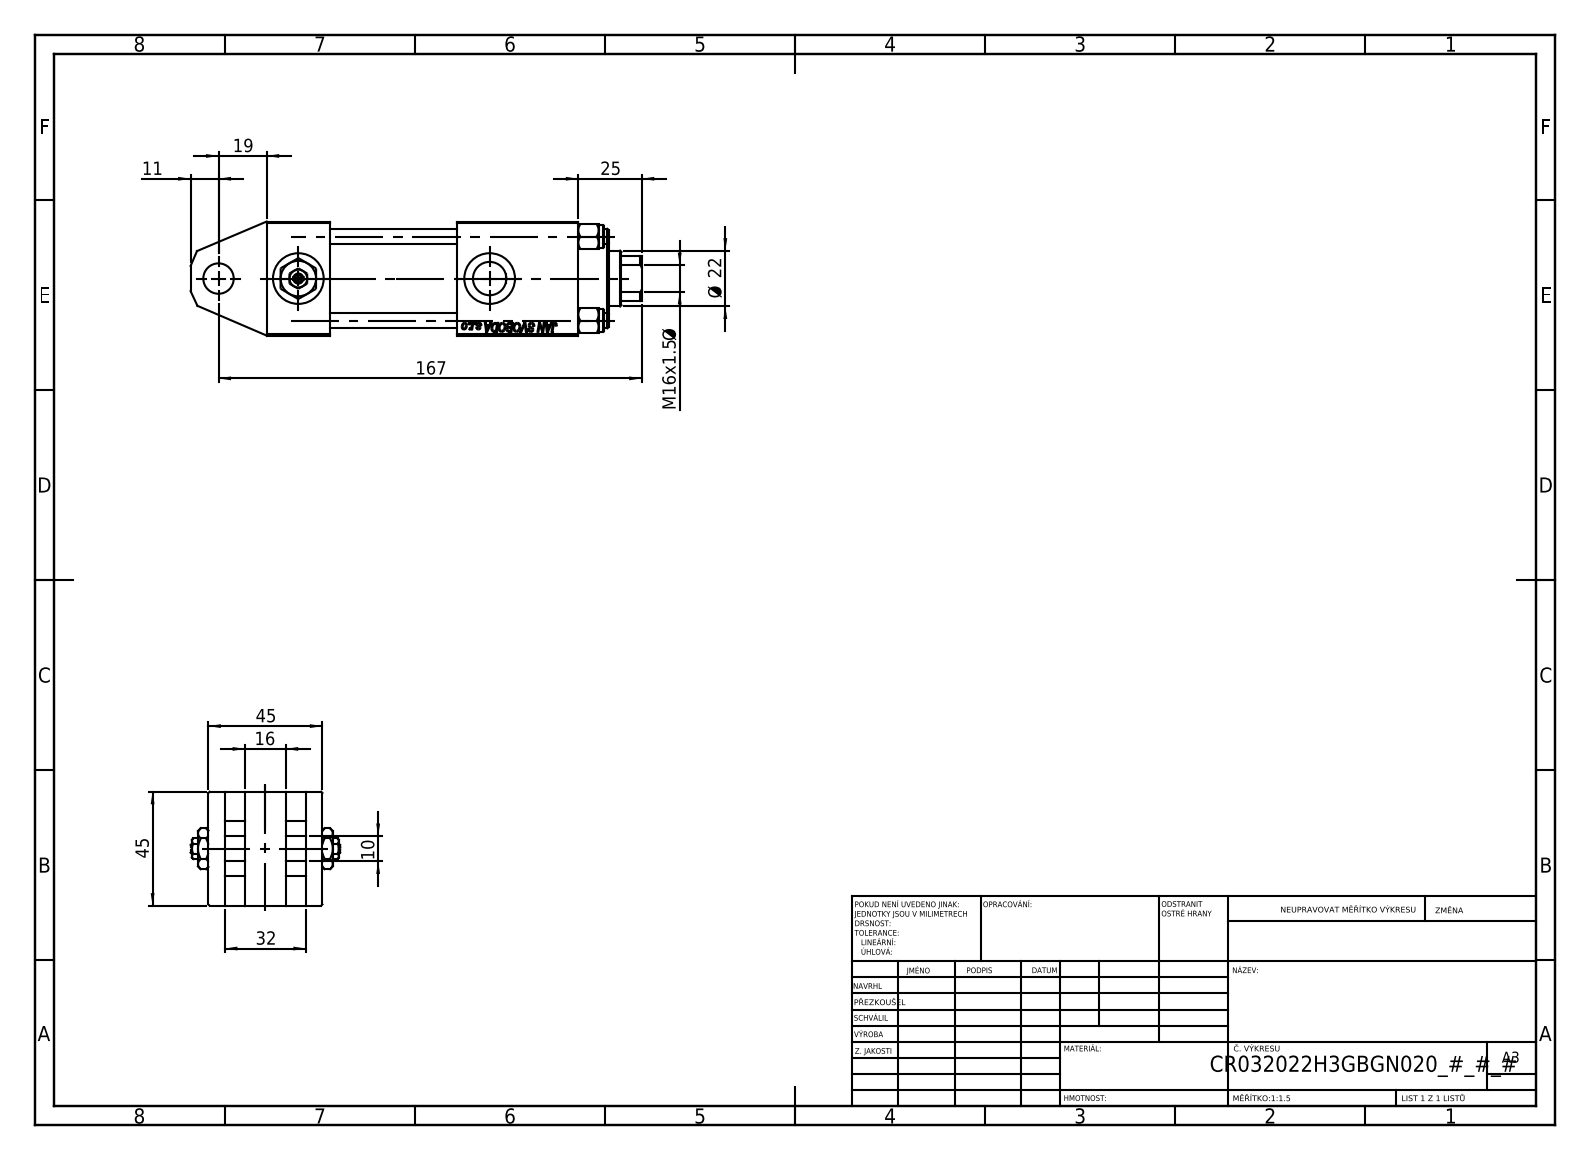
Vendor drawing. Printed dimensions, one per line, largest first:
167
45
45
32
25
Ø 22
19
M16x1.5 Ø
16
11
10
